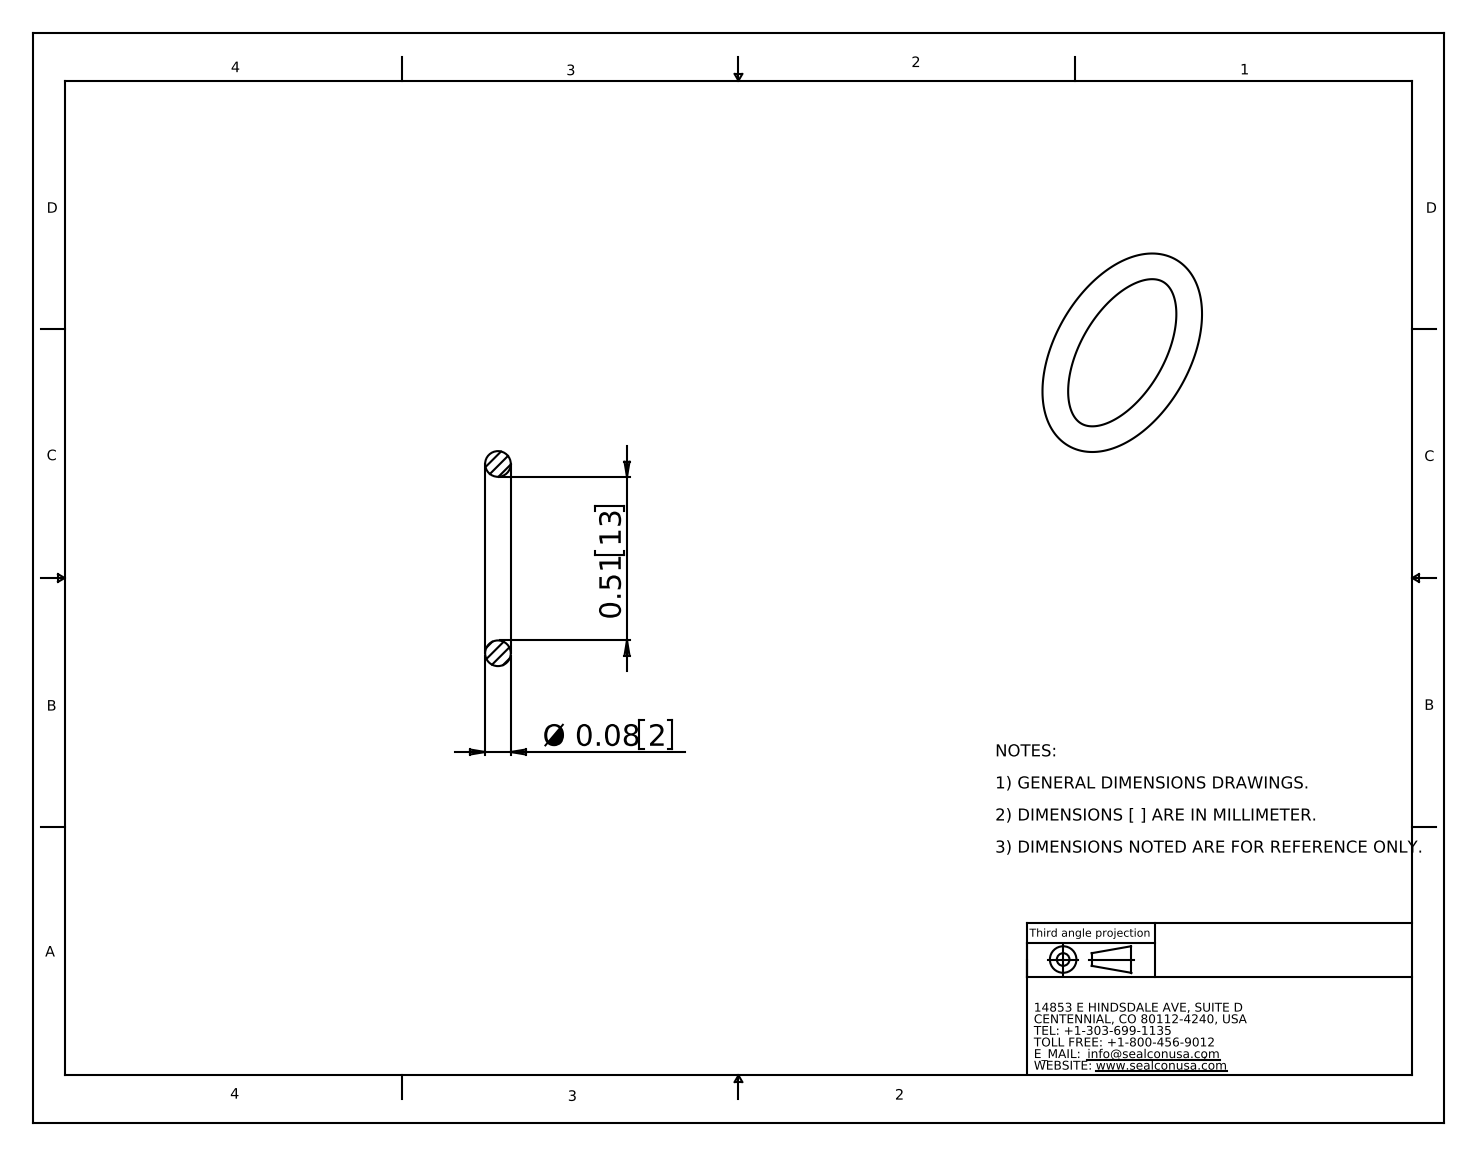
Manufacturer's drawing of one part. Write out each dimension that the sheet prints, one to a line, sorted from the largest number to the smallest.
0.51 13
Ø 0.08 2
